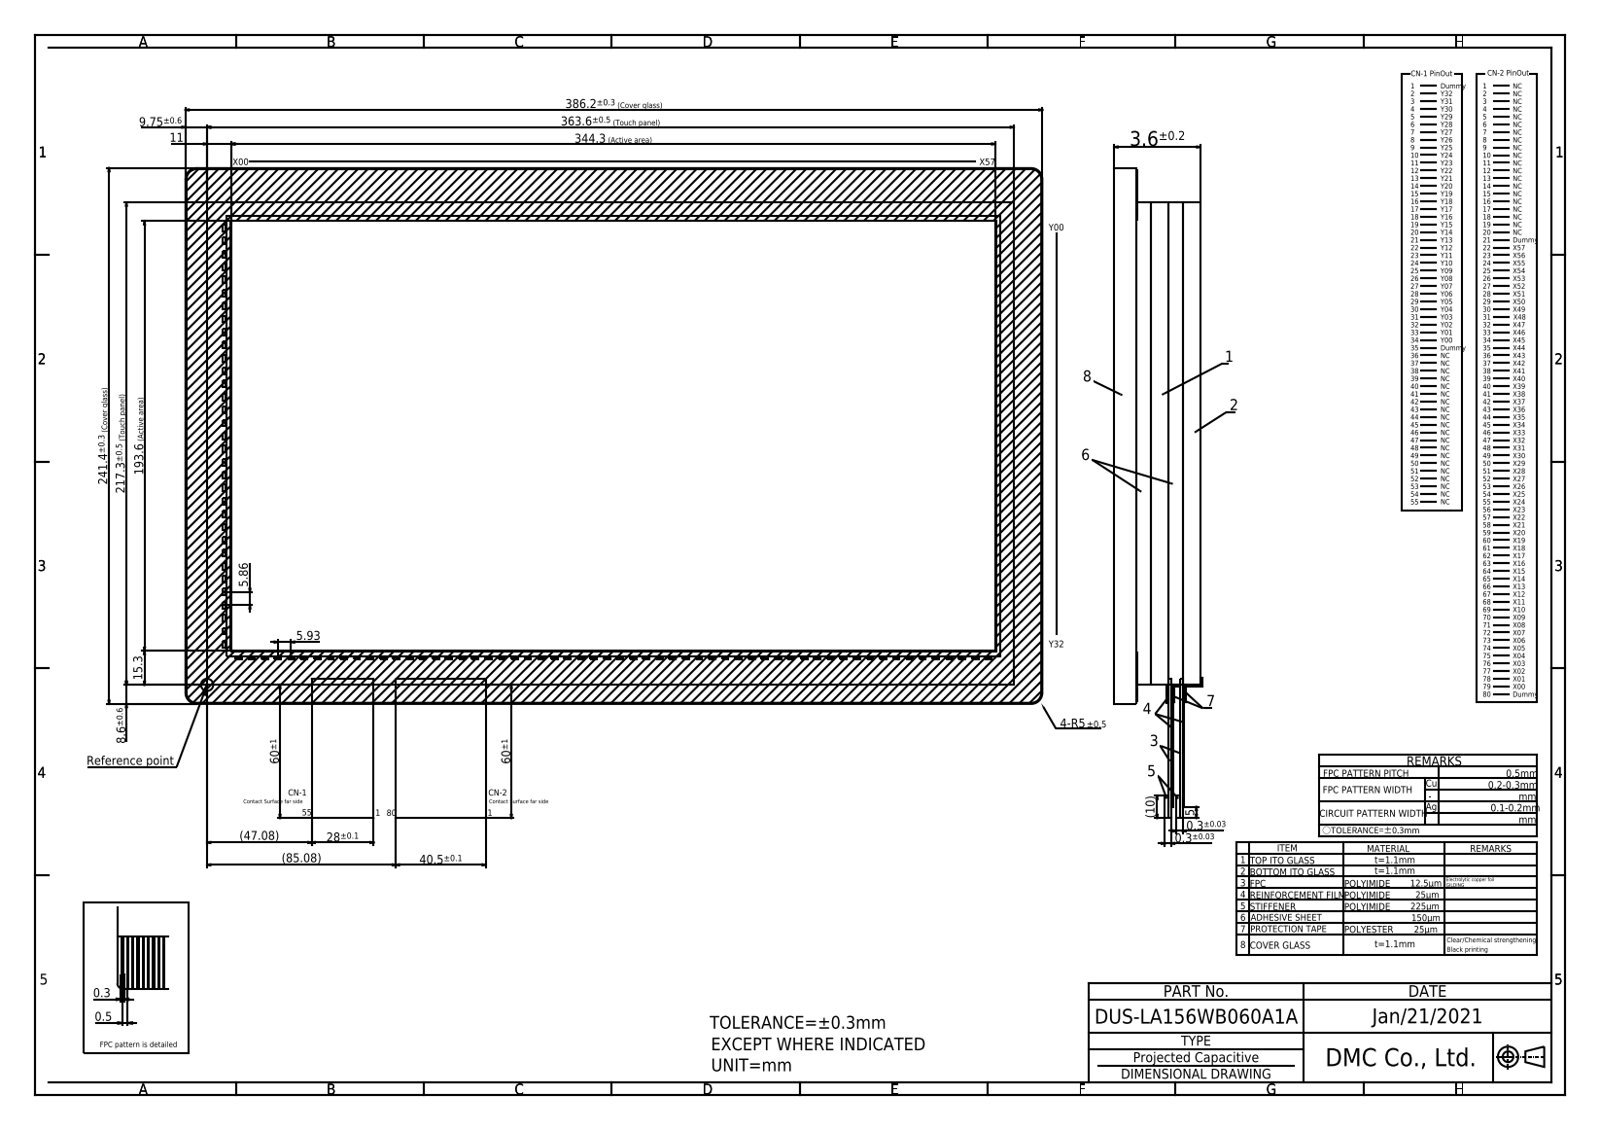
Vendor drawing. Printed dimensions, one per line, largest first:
386.2±0.3 (Cover glass)
363.6±0.5 (Touch panel)
344.3 (Active area)
241.4±0.3 (Cover glass)
217.3±0.5 (Touch panel)
193.6 (Active area)
(85.08)
60±1
60±1
(47.08)
40.5±0.1
28±0.1
15.3
11
(10)
9.75±0.6
8.6±0.6
5.93
5.86
5
3.6±0.2
0.5
0.3±0.03
0.3±0.03
0.3
